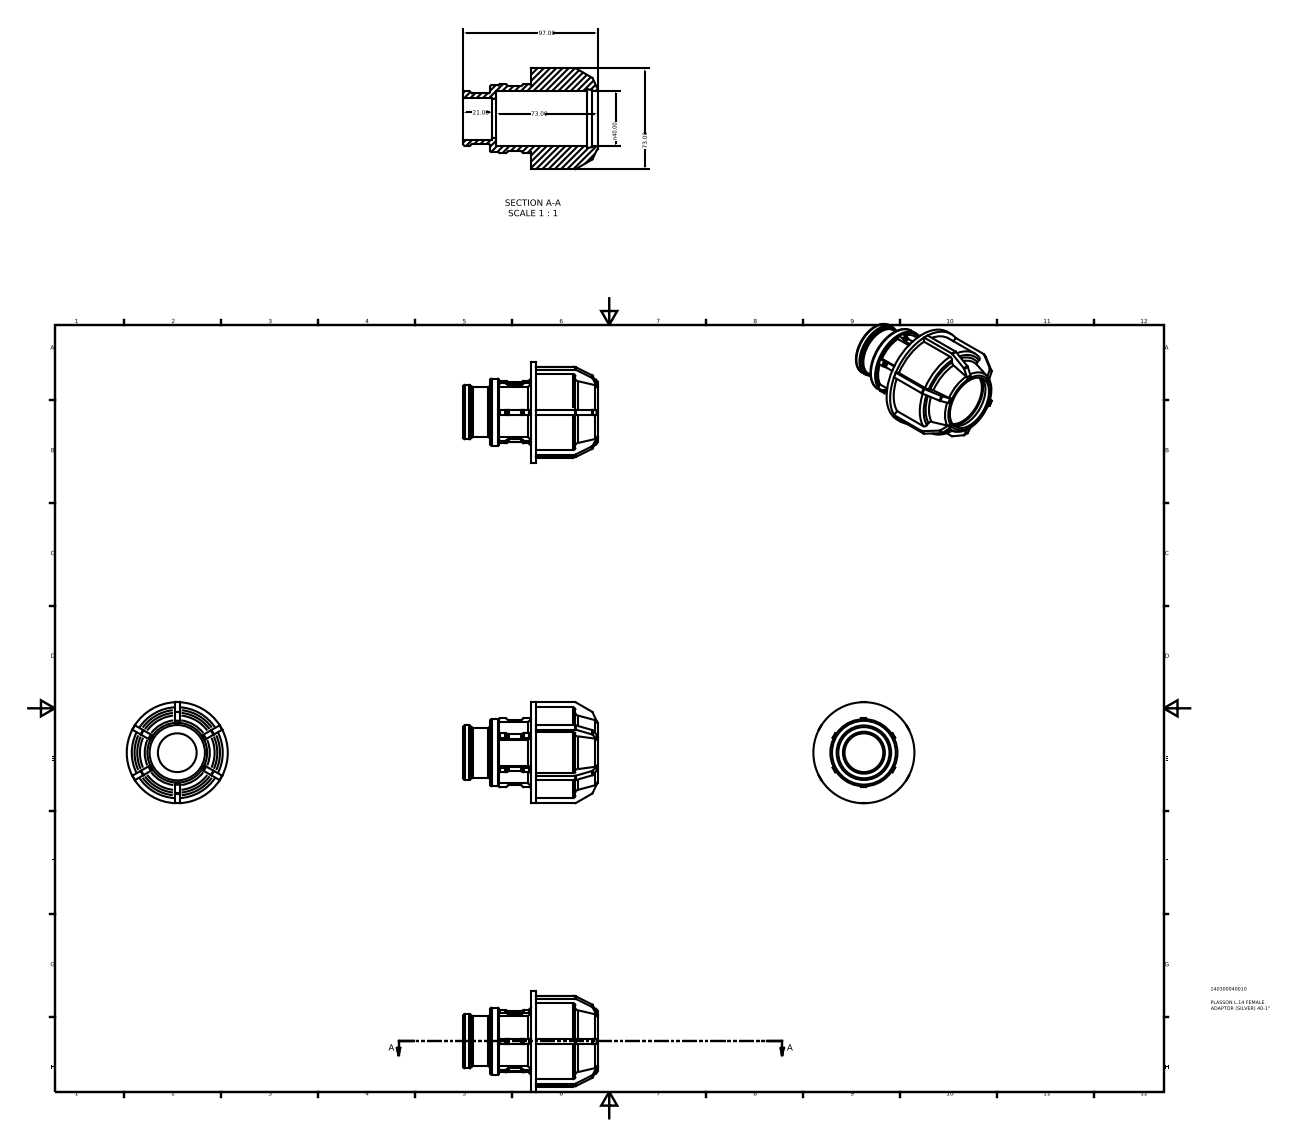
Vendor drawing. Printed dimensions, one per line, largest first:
97.00
73.00
73.00
n40.00
21.00
